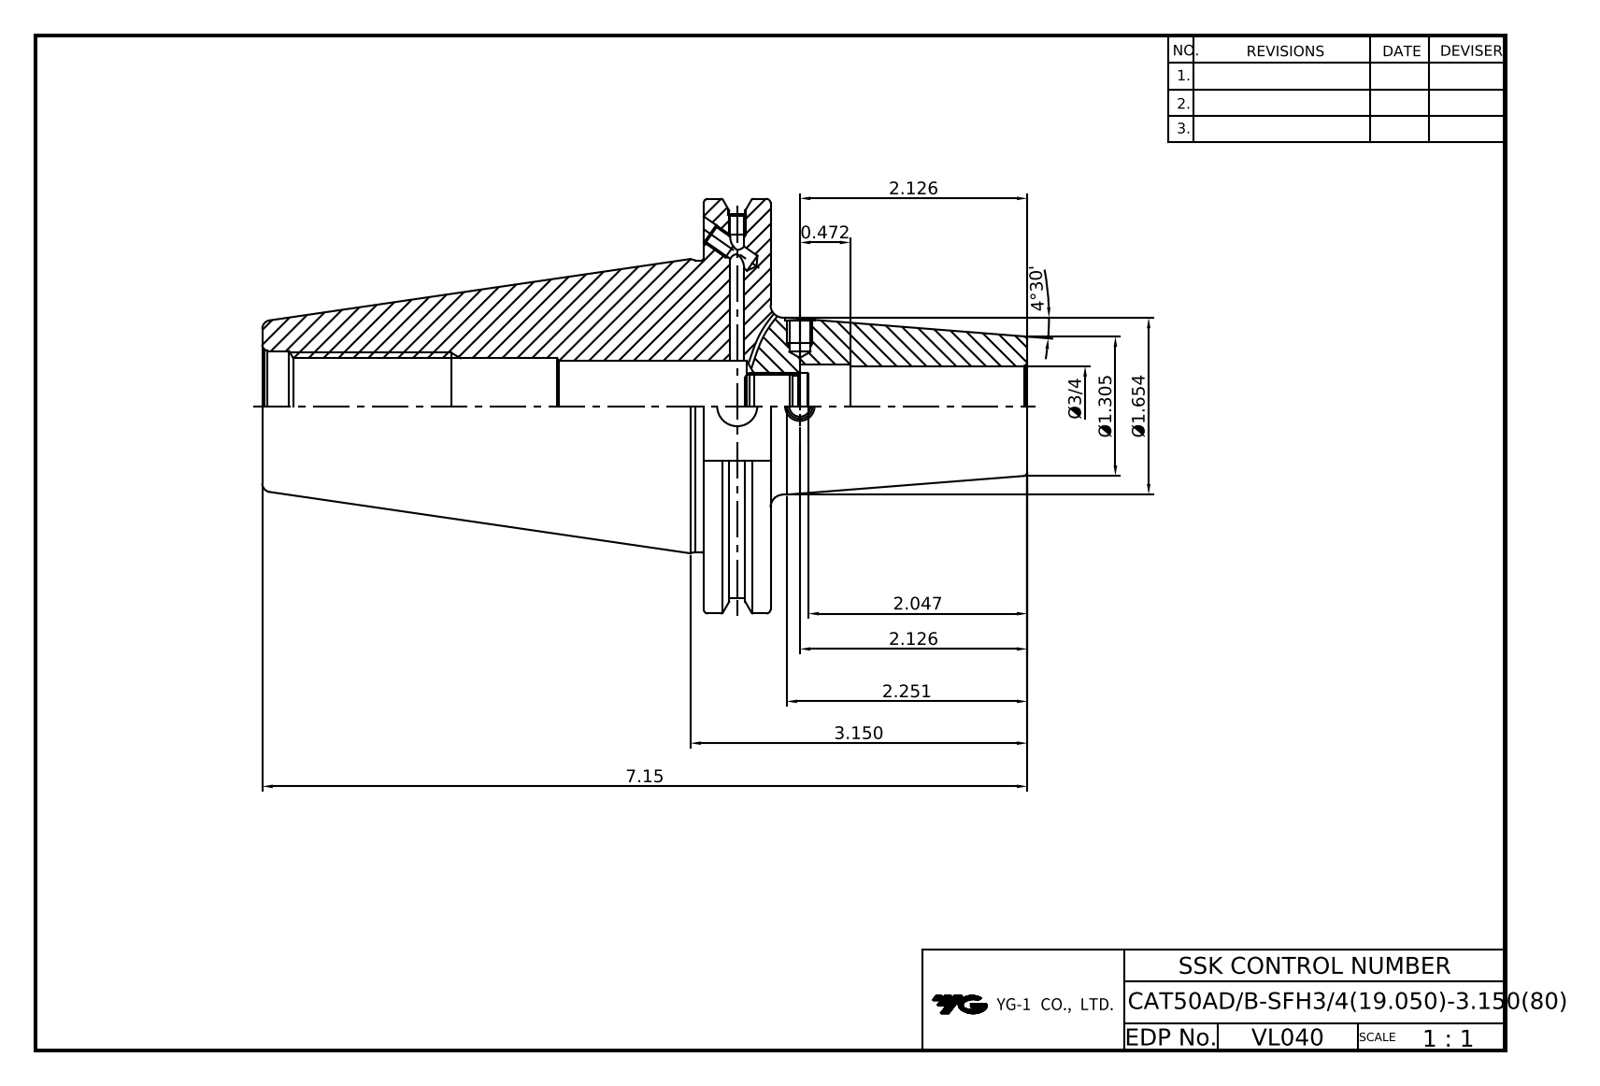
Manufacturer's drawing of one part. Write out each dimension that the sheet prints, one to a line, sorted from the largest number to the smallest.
7.15
3.150
2.251
2.126
2.126
2.047
Ø1.654
Ø1.305
Ø3/4
0.472
